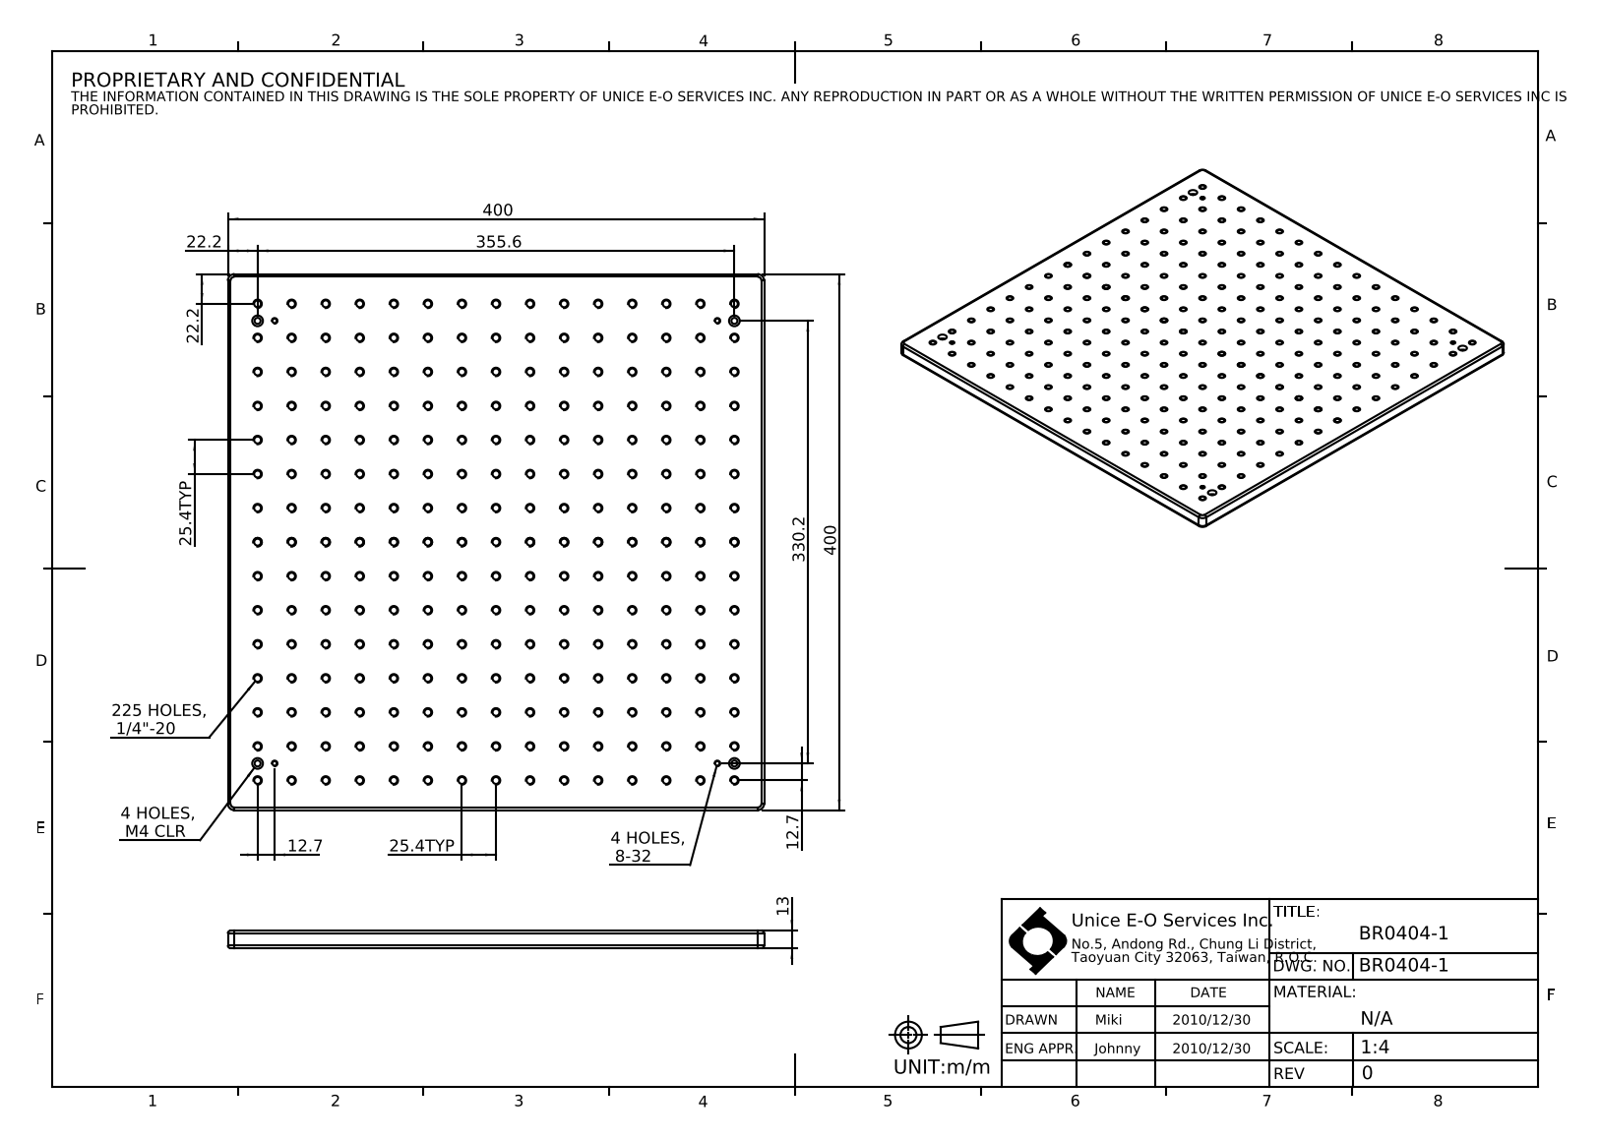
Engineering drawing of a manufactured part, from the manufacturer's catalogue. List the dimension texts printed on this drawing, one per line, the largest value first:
400
400
355.6
330.2
225 HOLES, 1/4"-20
25.4 TYP
25.4 TYP
22.2
22.2
13
12.7
12.7
4 HOLES, 8-32
4 HOLES, M4 CLR
